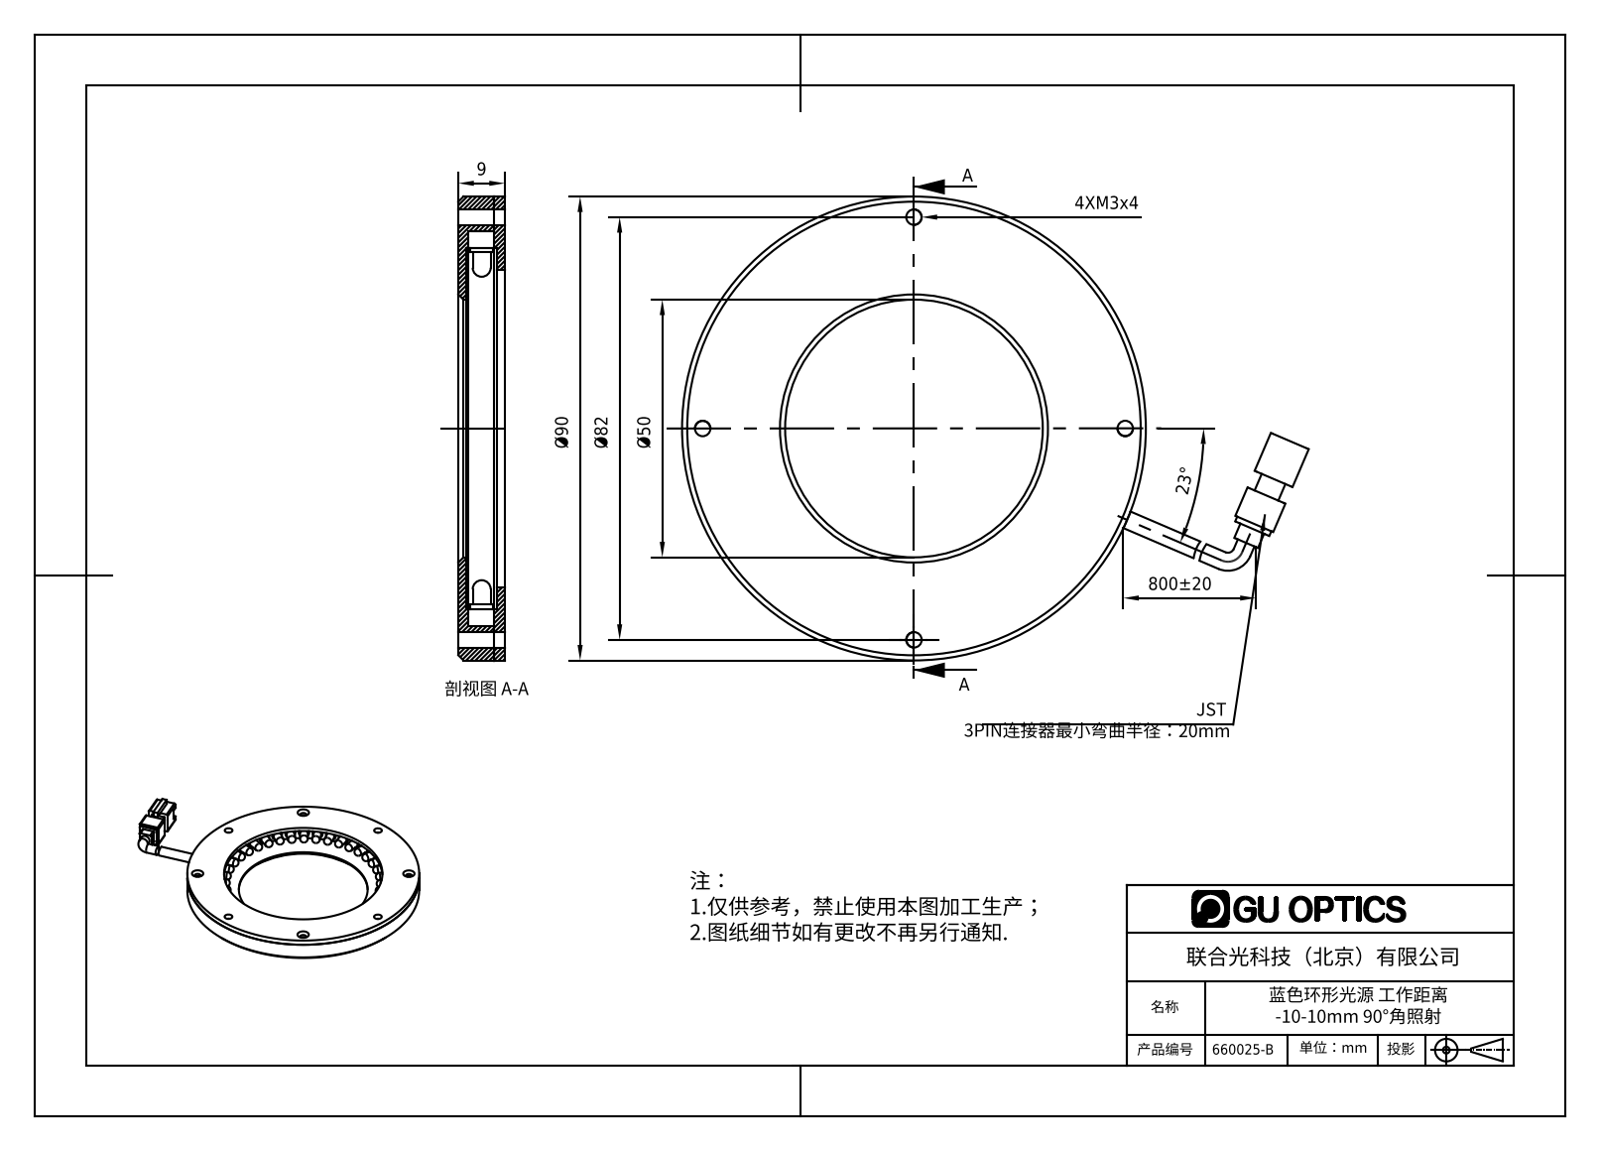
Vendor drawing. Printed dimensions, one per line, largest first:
800±20
Ø90
Ø82
Ø50
23°
9
4XM3x4
